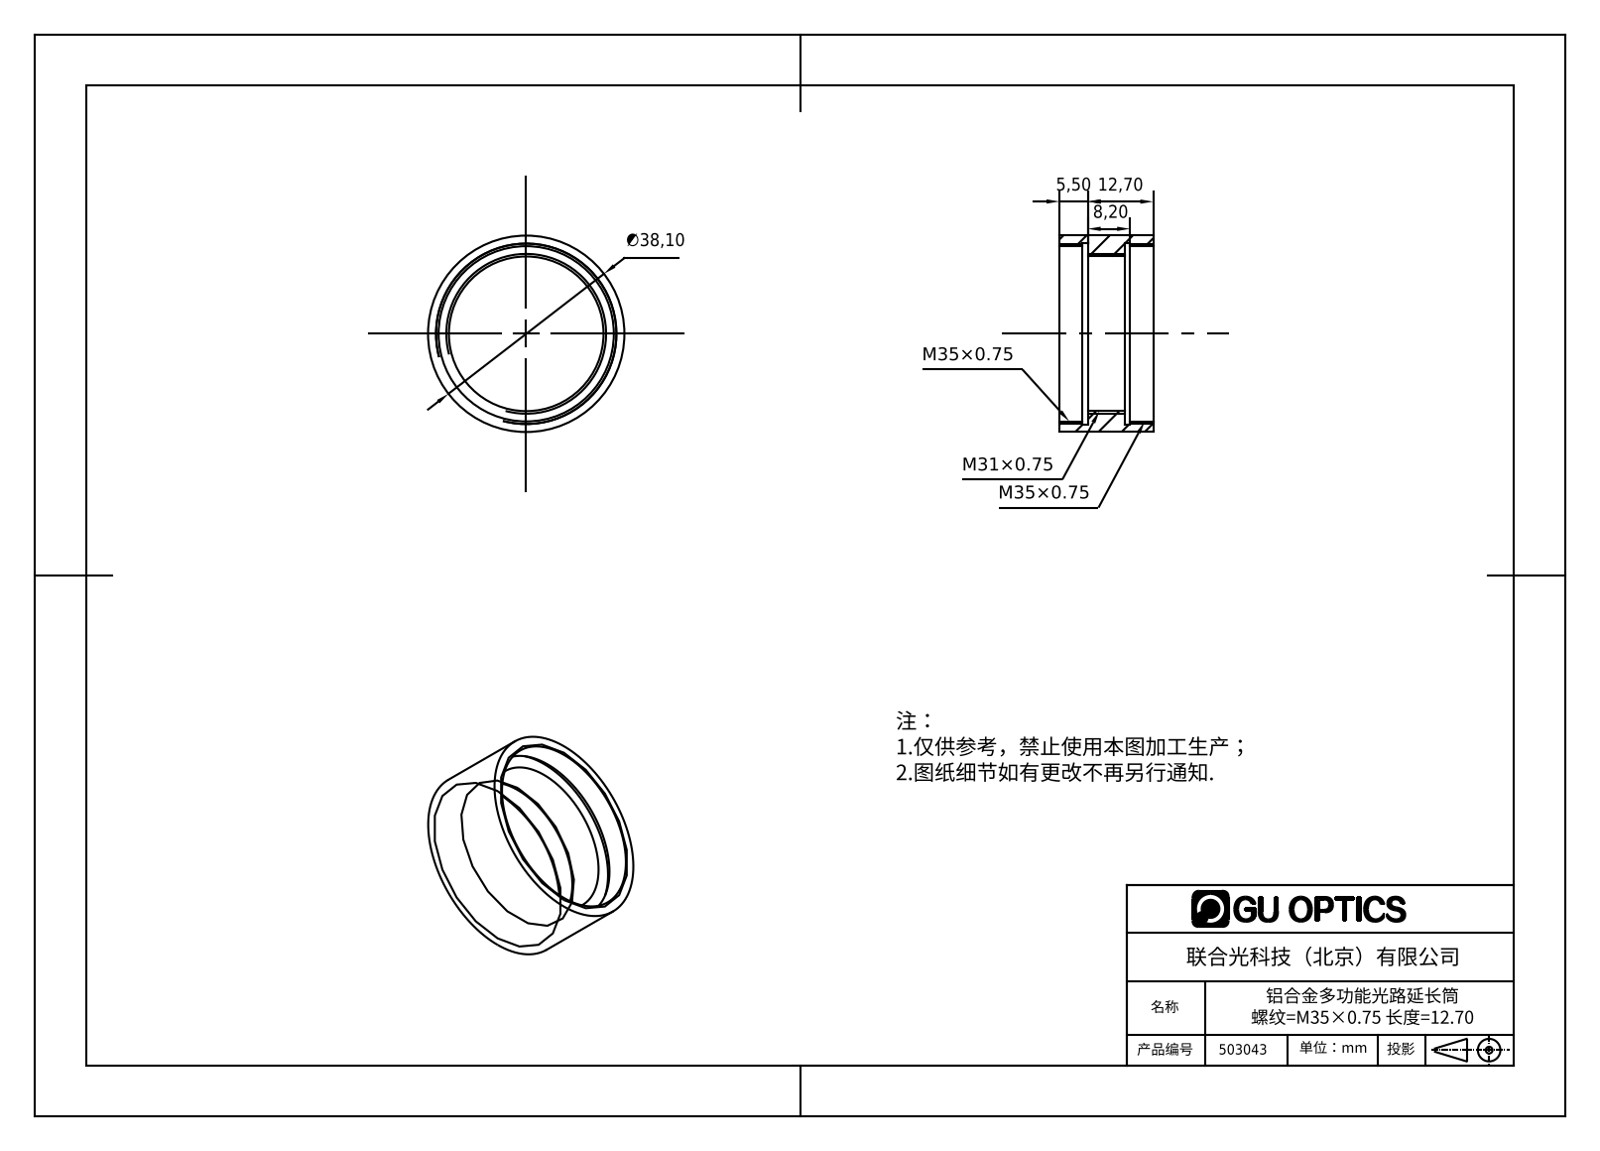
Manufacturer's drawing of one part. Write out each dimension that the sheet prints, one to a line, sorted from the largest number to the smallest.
∅38,10
12,70
8,20
5,50
